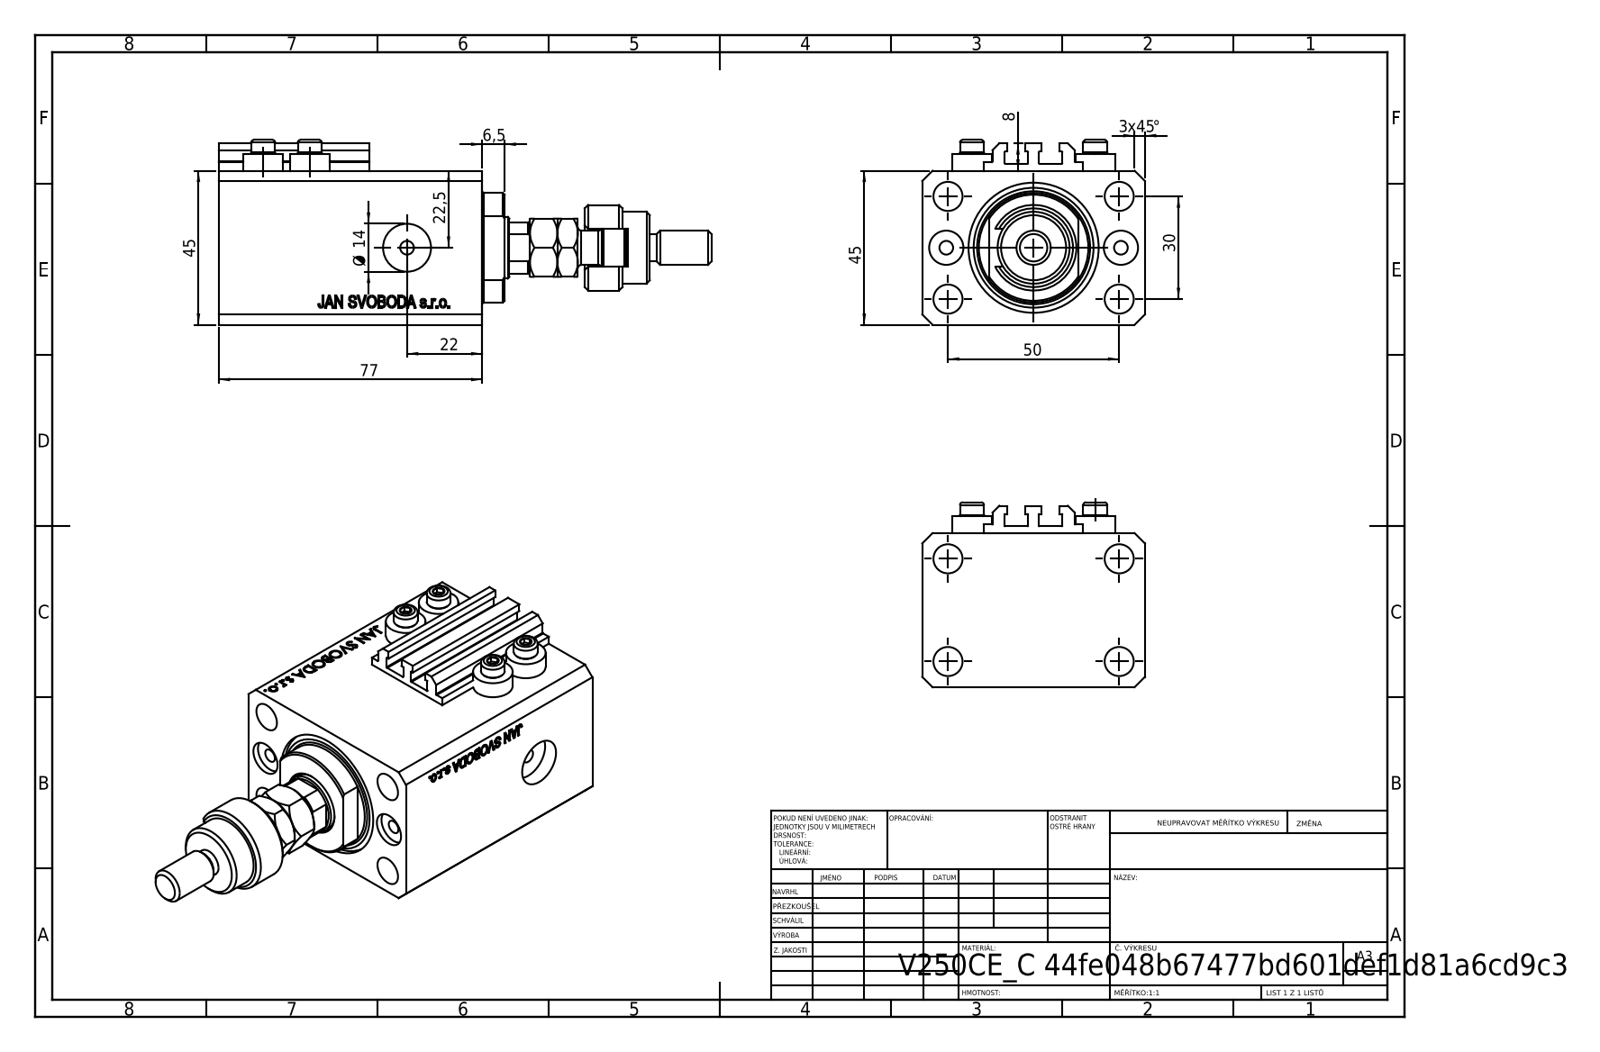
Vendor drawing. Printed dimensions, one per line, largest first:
77
50
45
3 x45 °
45
30
22,5
22
Ø 14
8
6,5
